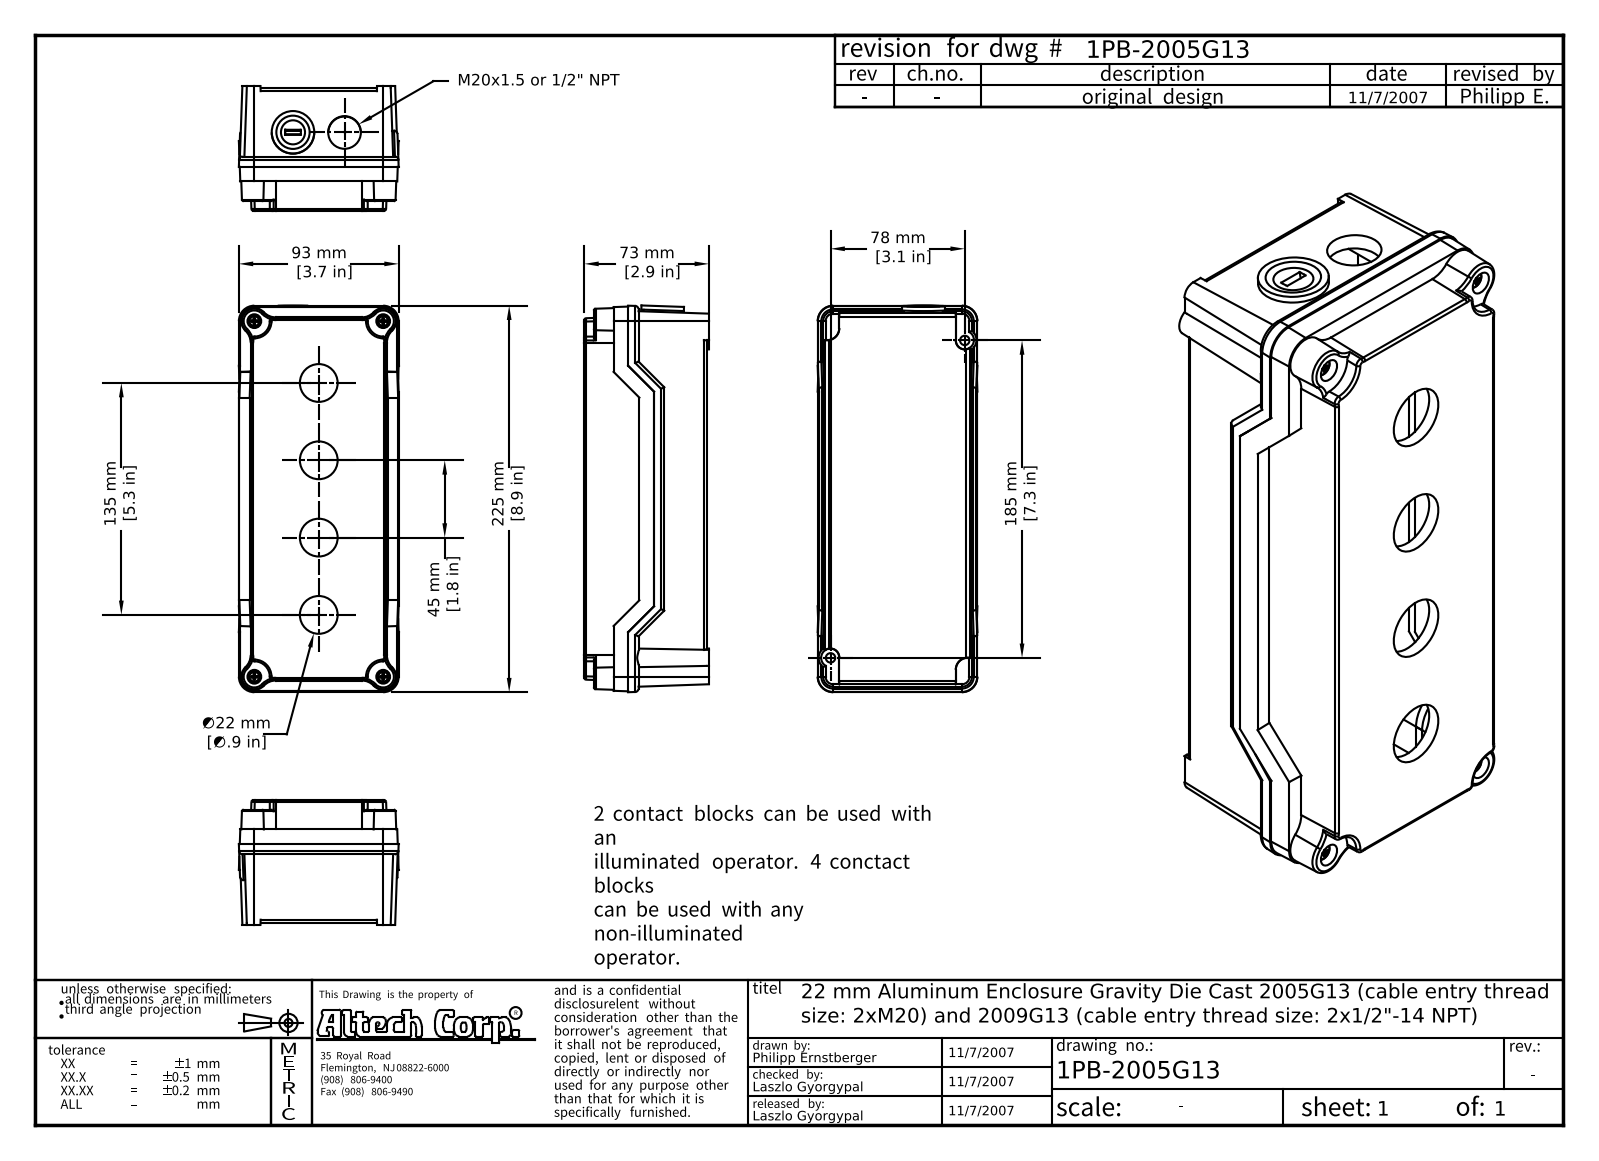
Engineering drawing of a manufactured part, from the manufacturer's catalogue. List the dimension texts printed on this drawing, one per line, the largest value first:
225 mm [8.9 in]
185 mm [7.3 in]
135 mm [5.3 in]
93 mm [3.7 in]
78 mm [3.1 in]
73 mm [2.9 in]
45 mm [1.8 in]
∅22 mm [∅.9 in]
M20x1.5 or 1/2" NPT
